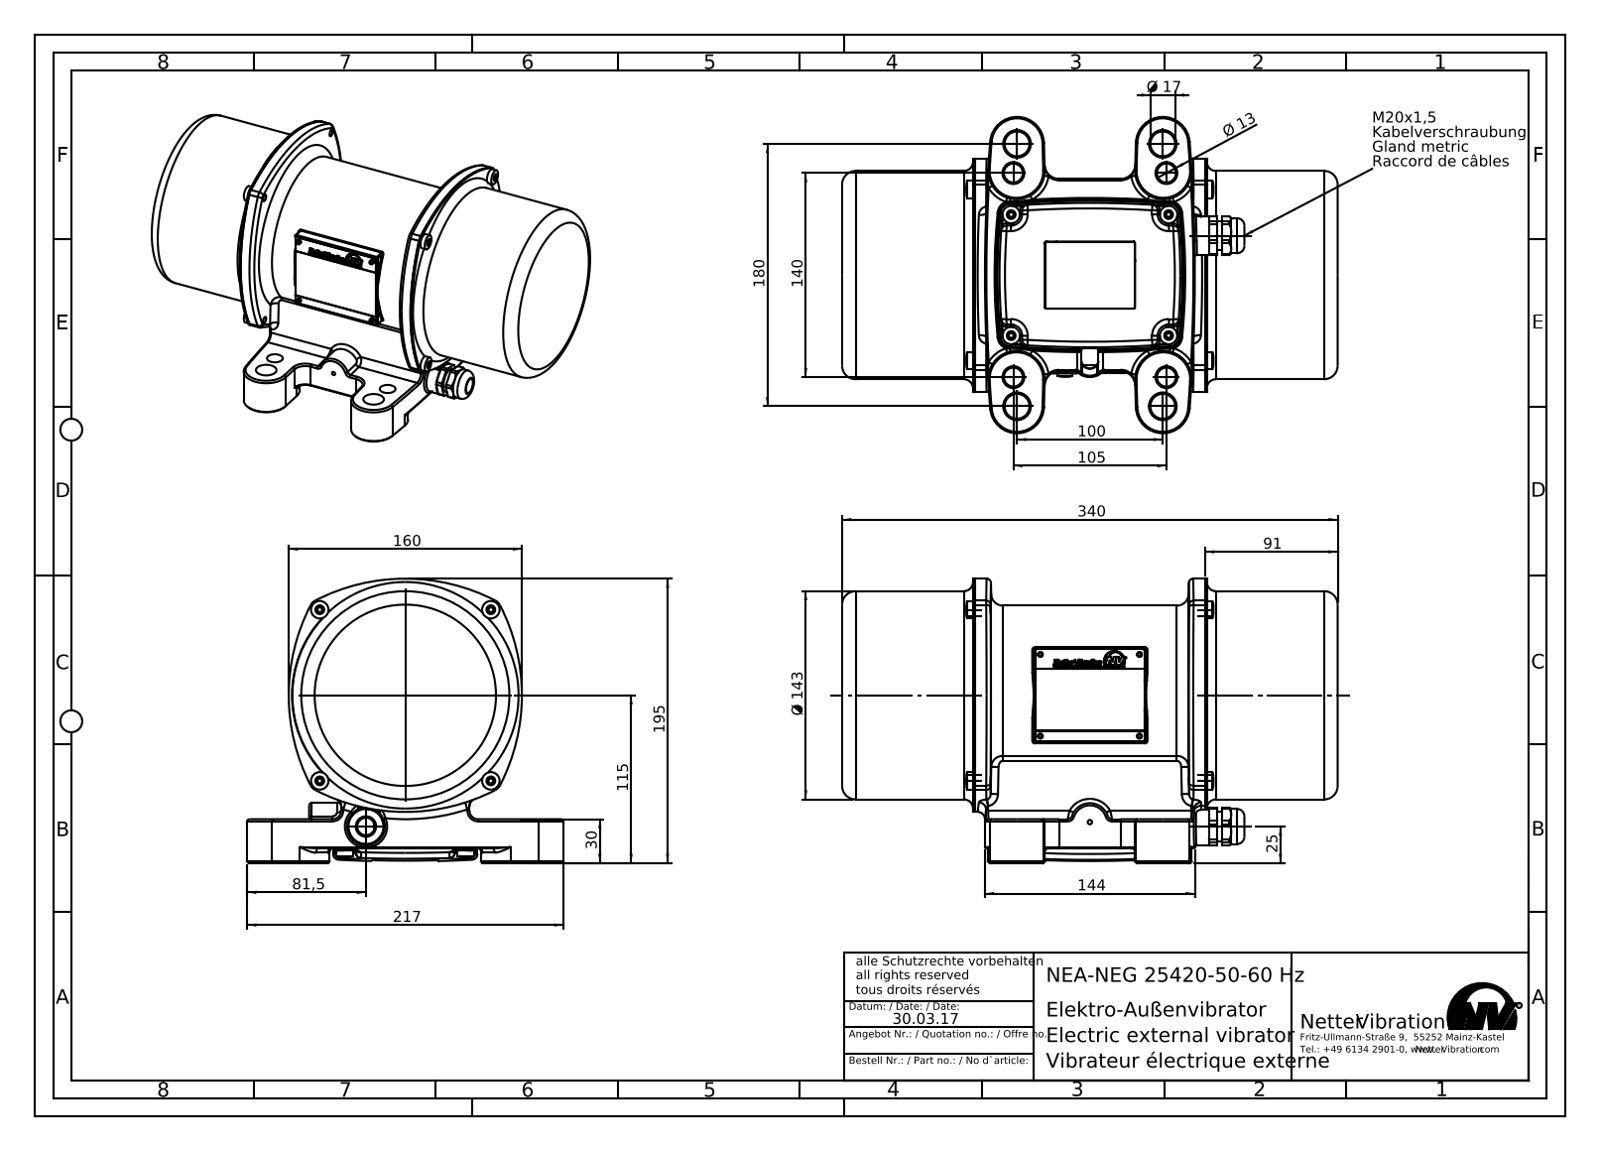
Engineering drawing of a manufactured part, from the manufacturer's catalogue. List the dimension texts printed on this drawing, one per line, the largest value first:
340
217
195
180
160
144
Ø 143
140
115
105
100
91
81,5
30
25
Ø 17
Ø 13
